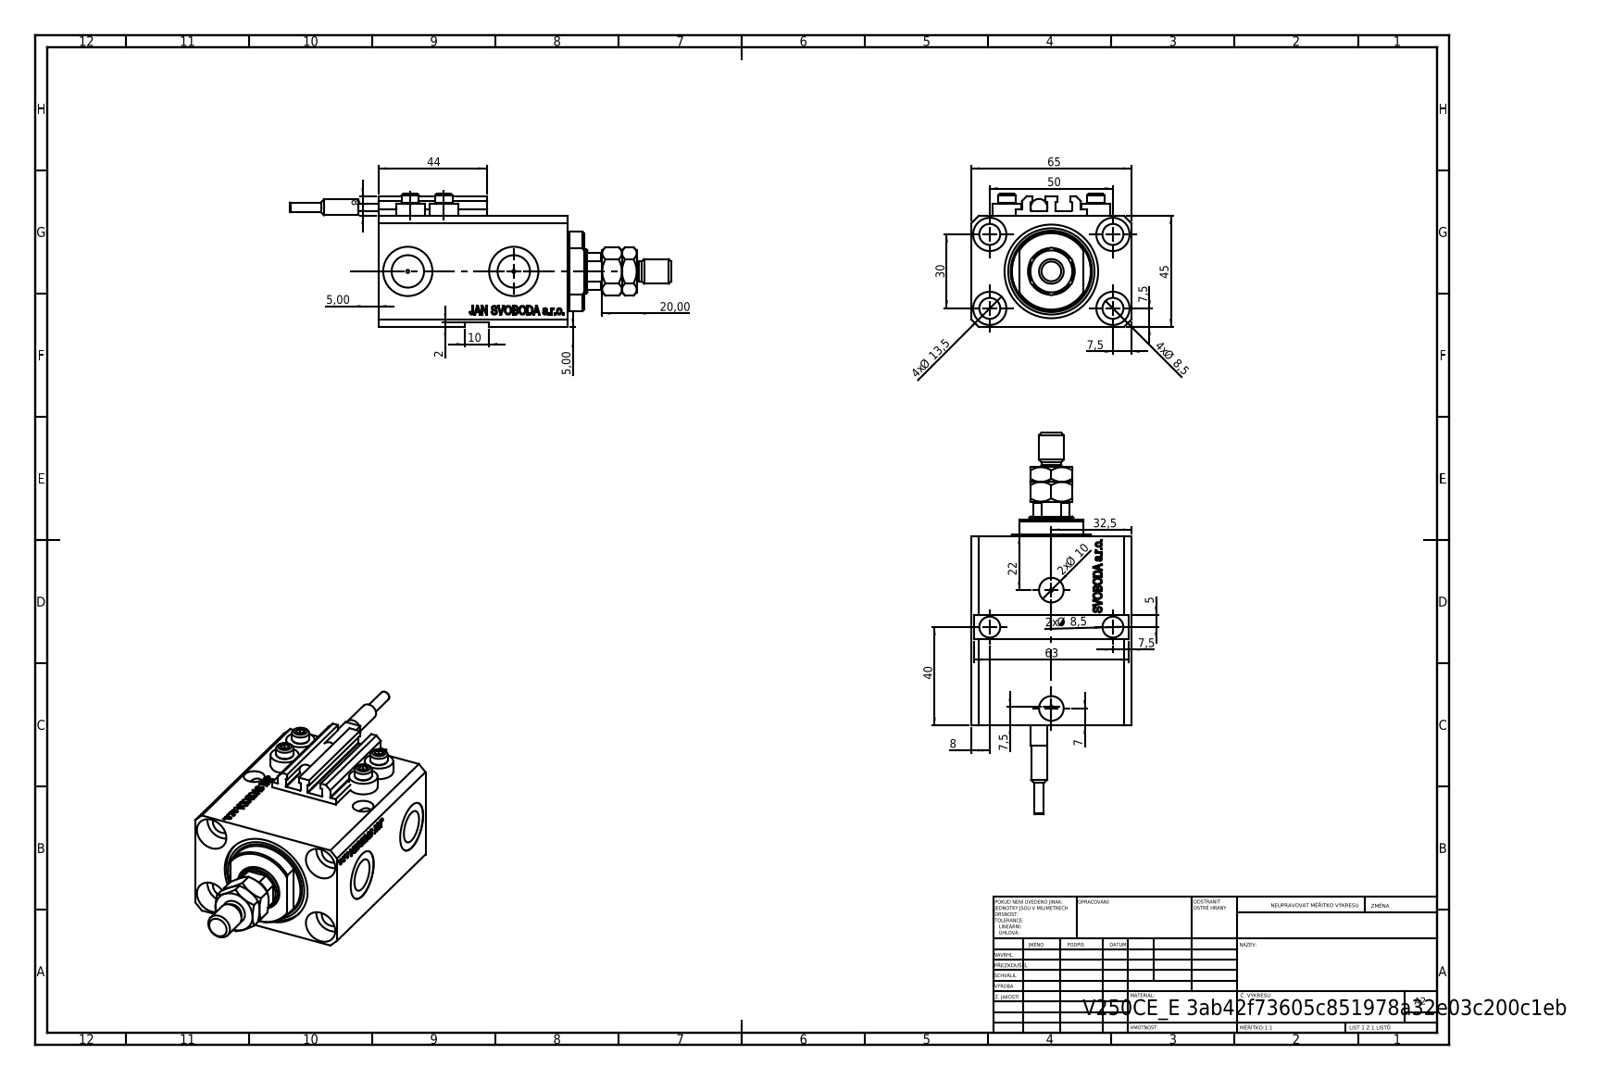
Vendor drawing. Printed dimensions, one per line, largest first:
65
63
50
45
44
40
32,5
30
22
20,00
4x Ø 13,5
10
2x Ø 10
4x Ø 8,5
2x Ø 8,5
8
8
7,5
7,5
7,5
7,5
7
5,00
5,00
5
2
